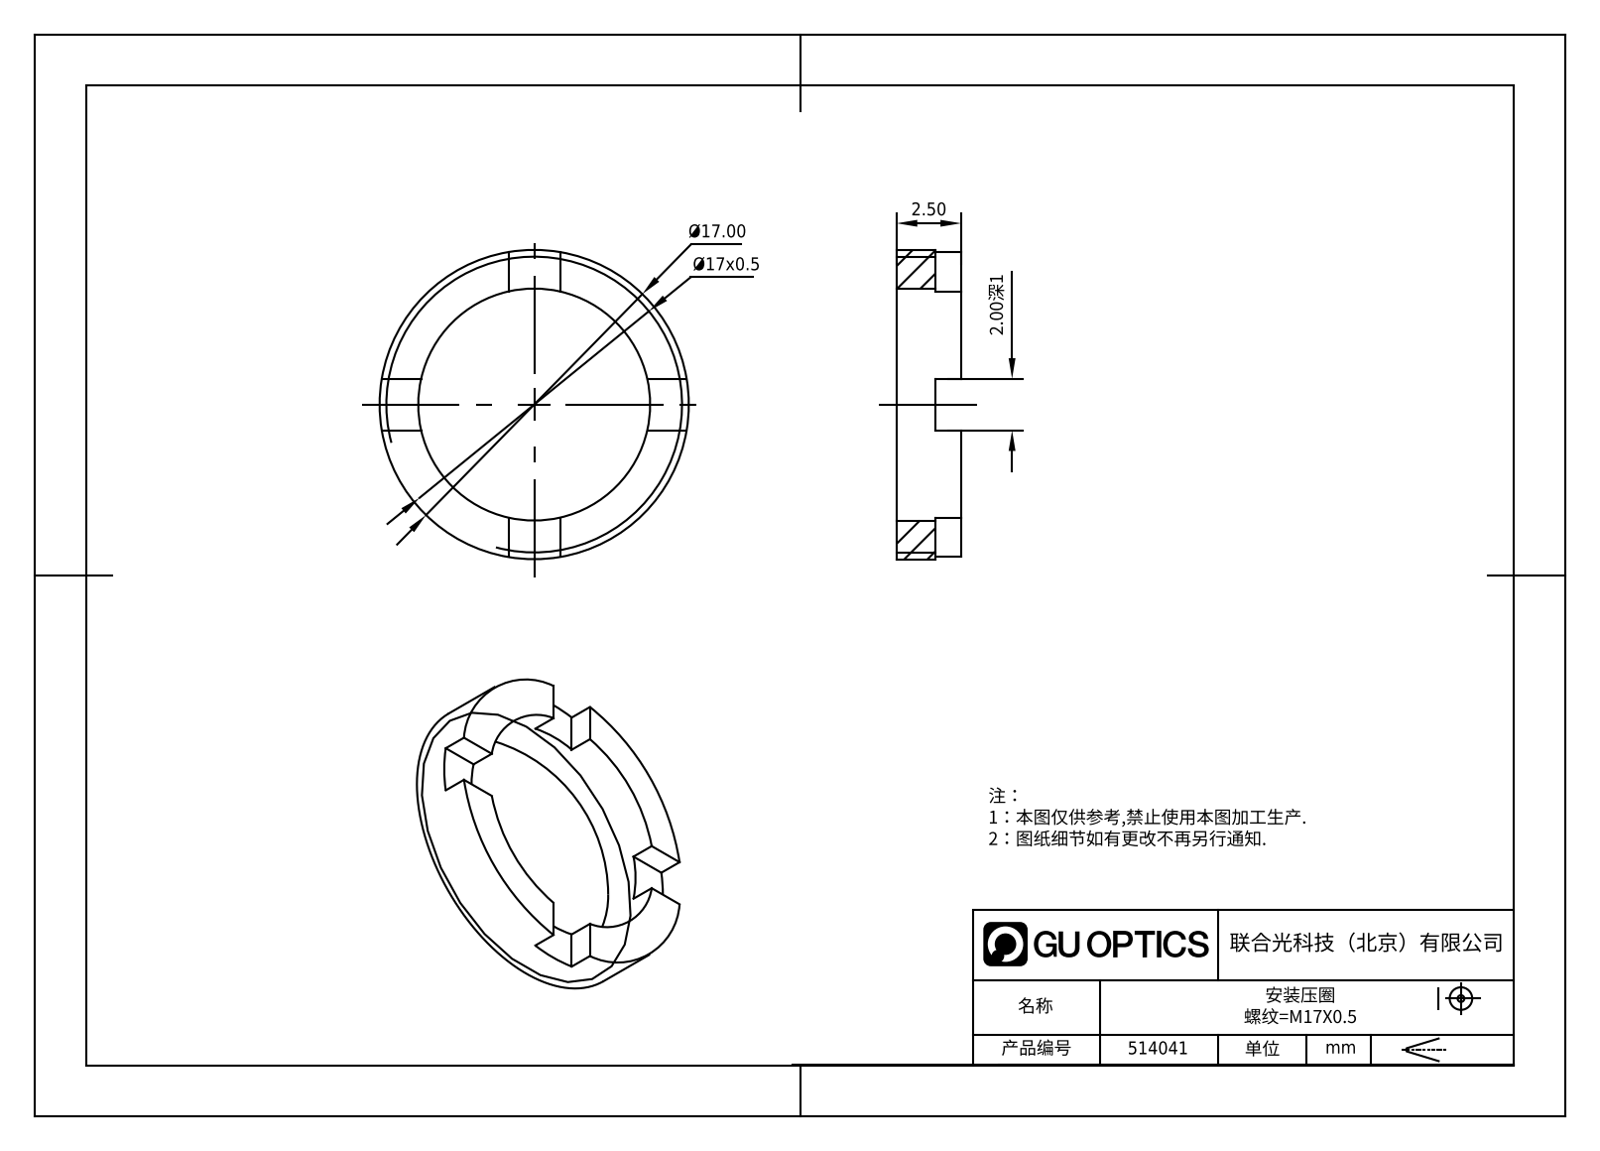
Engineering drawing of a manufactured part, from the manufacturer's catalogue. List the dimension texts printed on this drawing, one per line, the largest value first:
Ø17.00
Ø17x0.5
2.50
2.00深1
